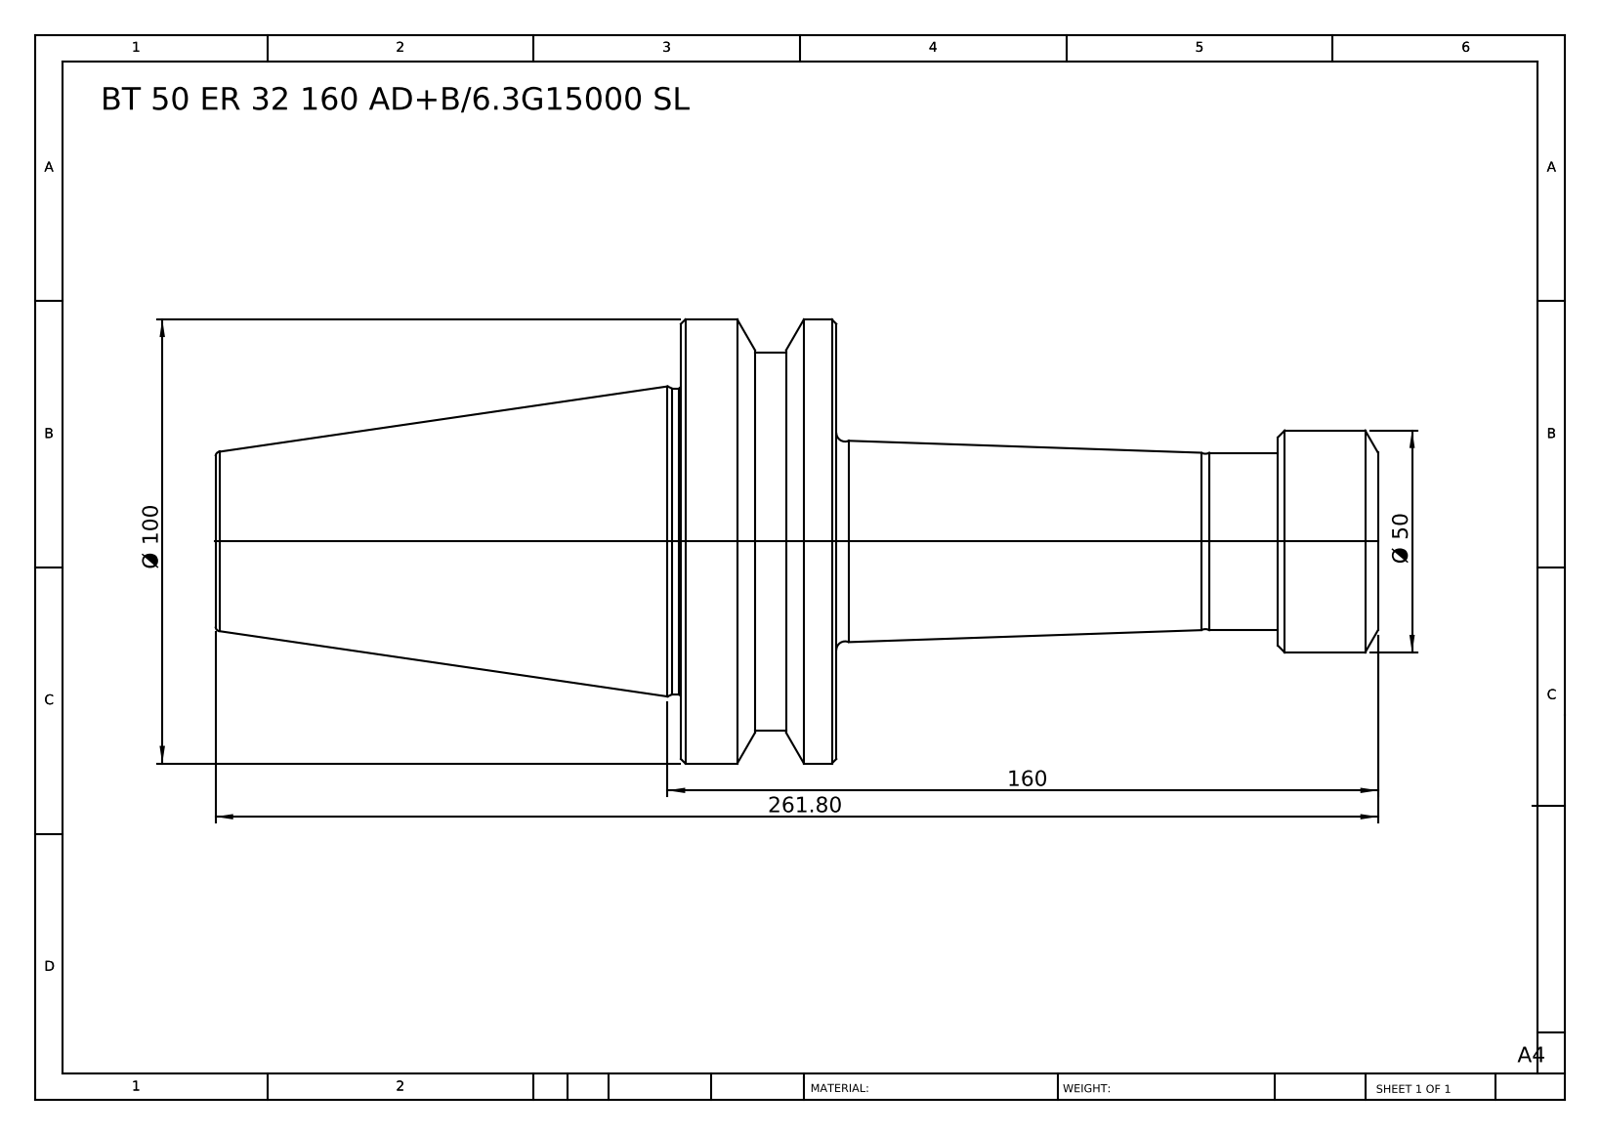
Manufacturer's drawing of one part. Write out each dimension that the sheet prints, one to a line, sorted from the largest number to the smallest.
261.80
160
Ø 100
Ø 50
